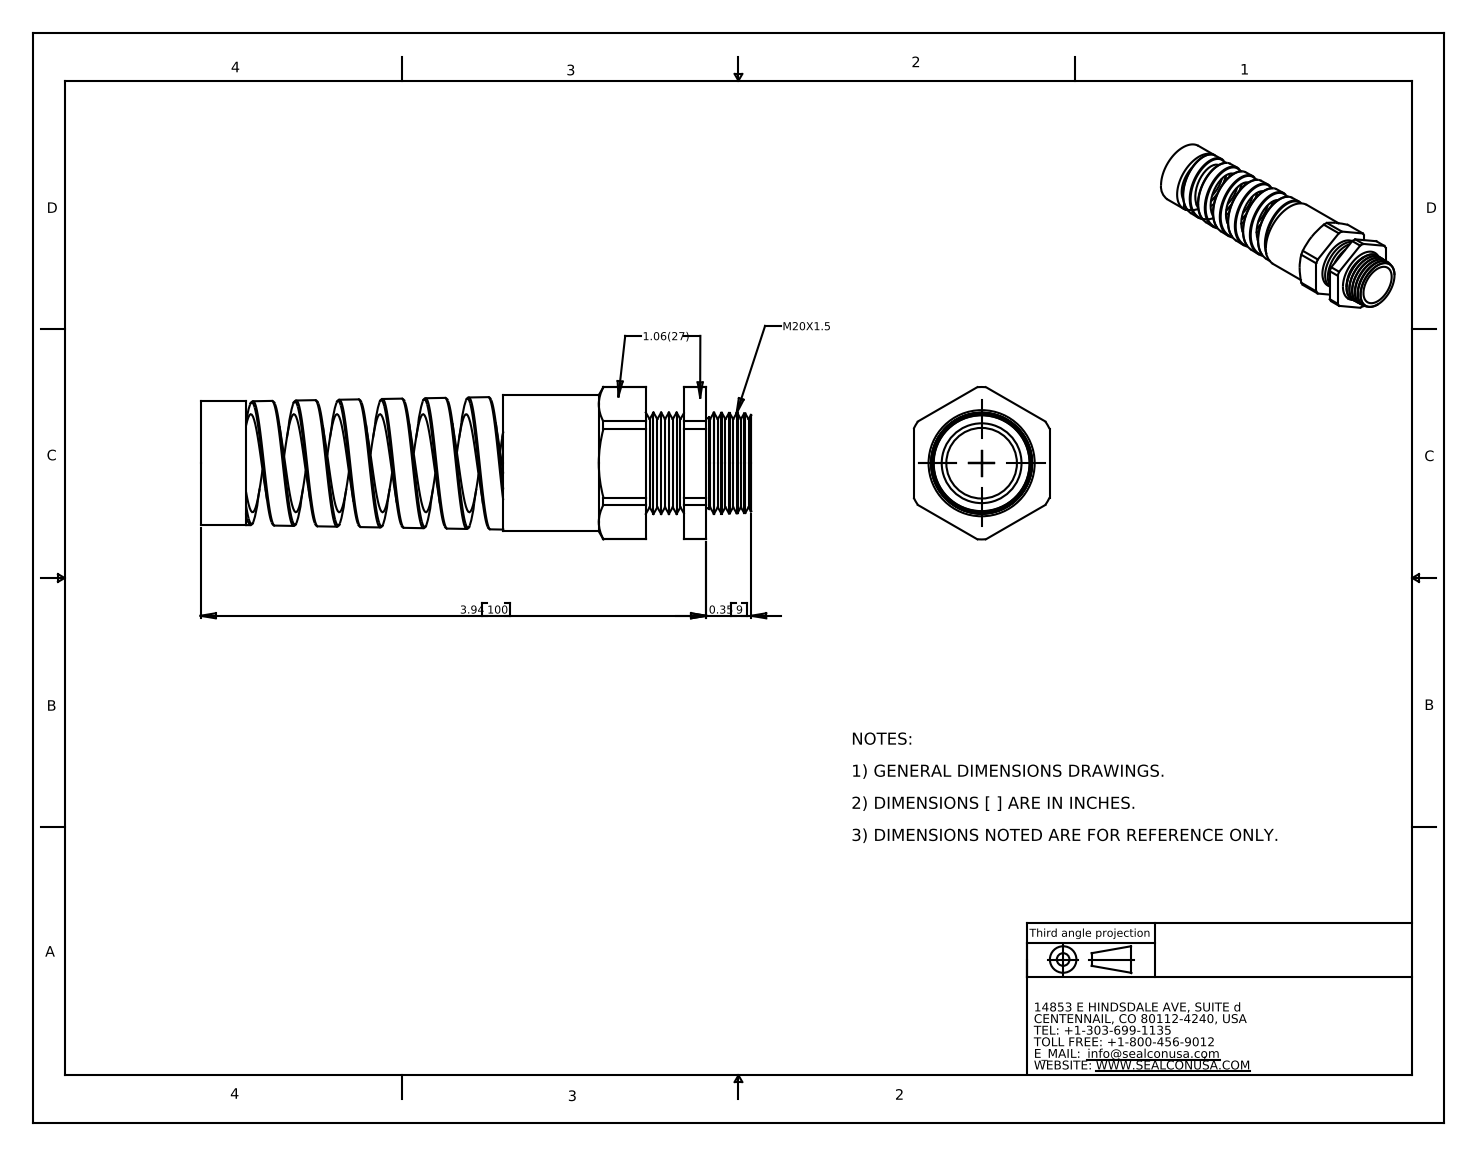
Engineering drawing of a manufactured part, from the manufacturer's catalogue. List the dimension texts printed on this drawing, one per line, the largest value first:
3.94 100
0.35 9
